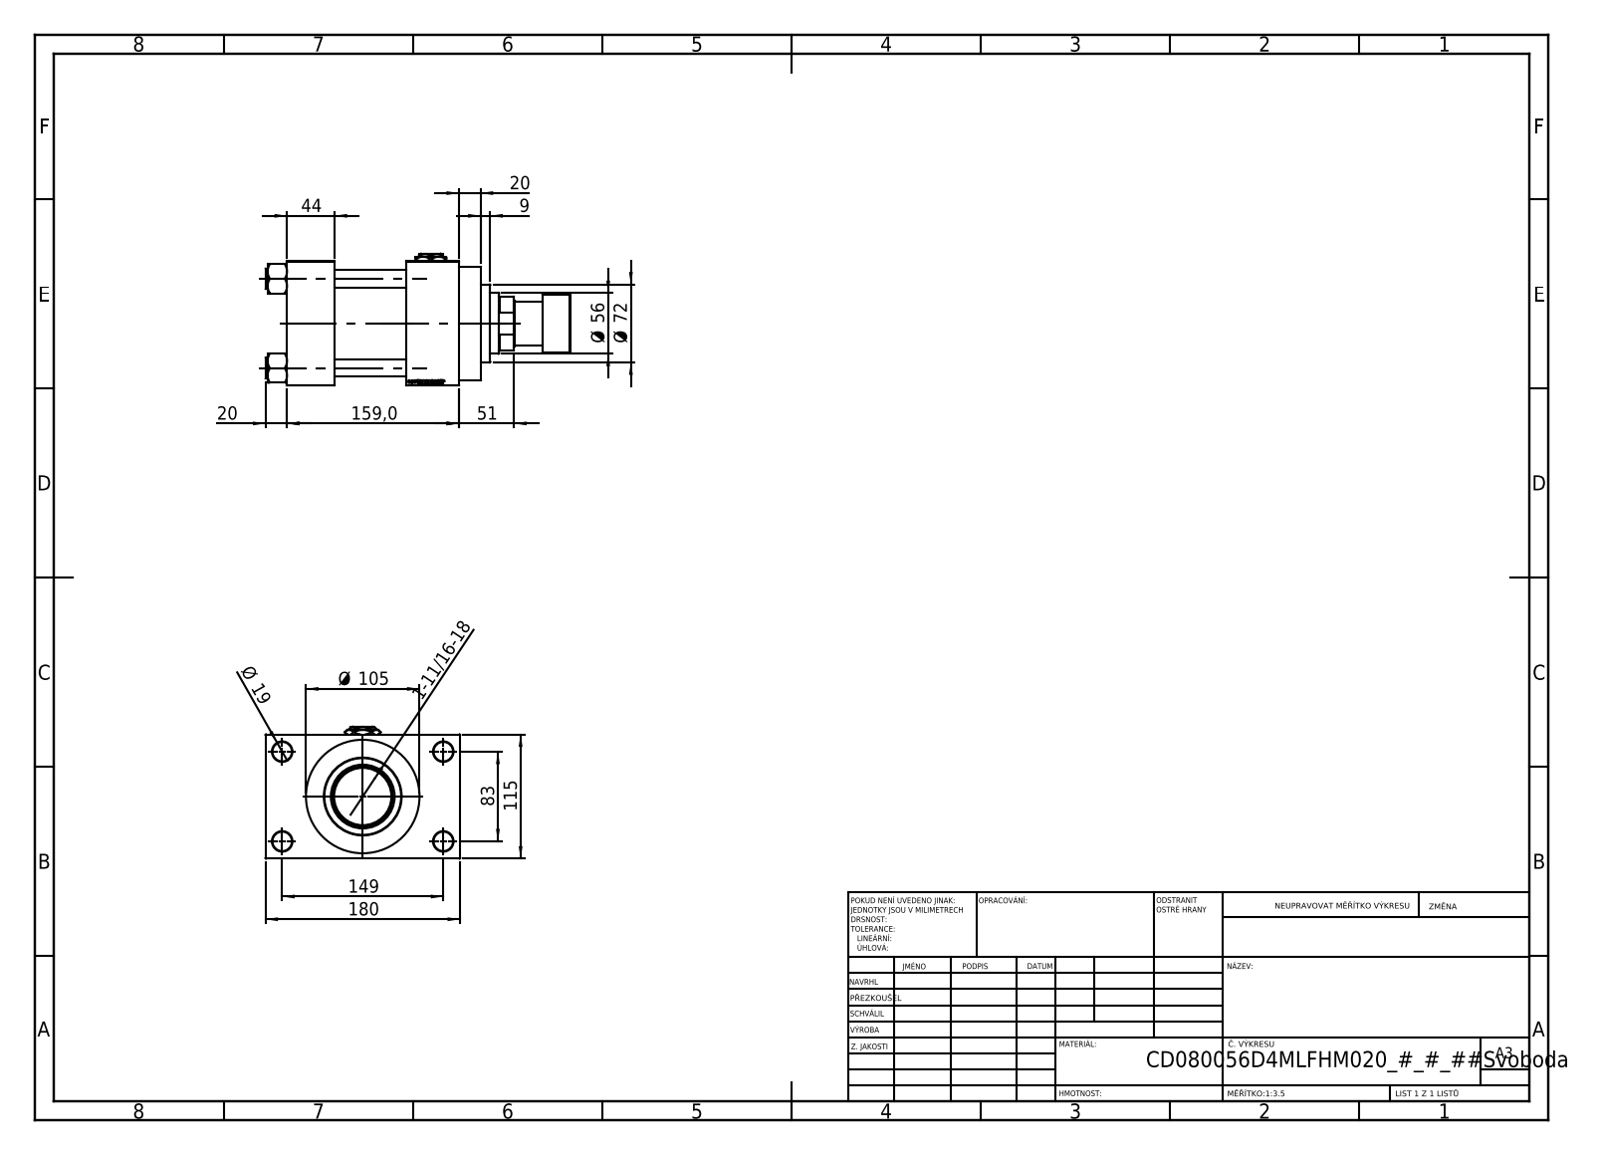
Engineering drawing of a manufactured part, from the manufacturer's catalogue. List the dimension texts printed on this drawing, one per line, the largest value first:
180
159,0
149
115
Ø 105
83
Ø 72
Ø 56
51
44
20
20
Ø 19
9
1-11/16-18
